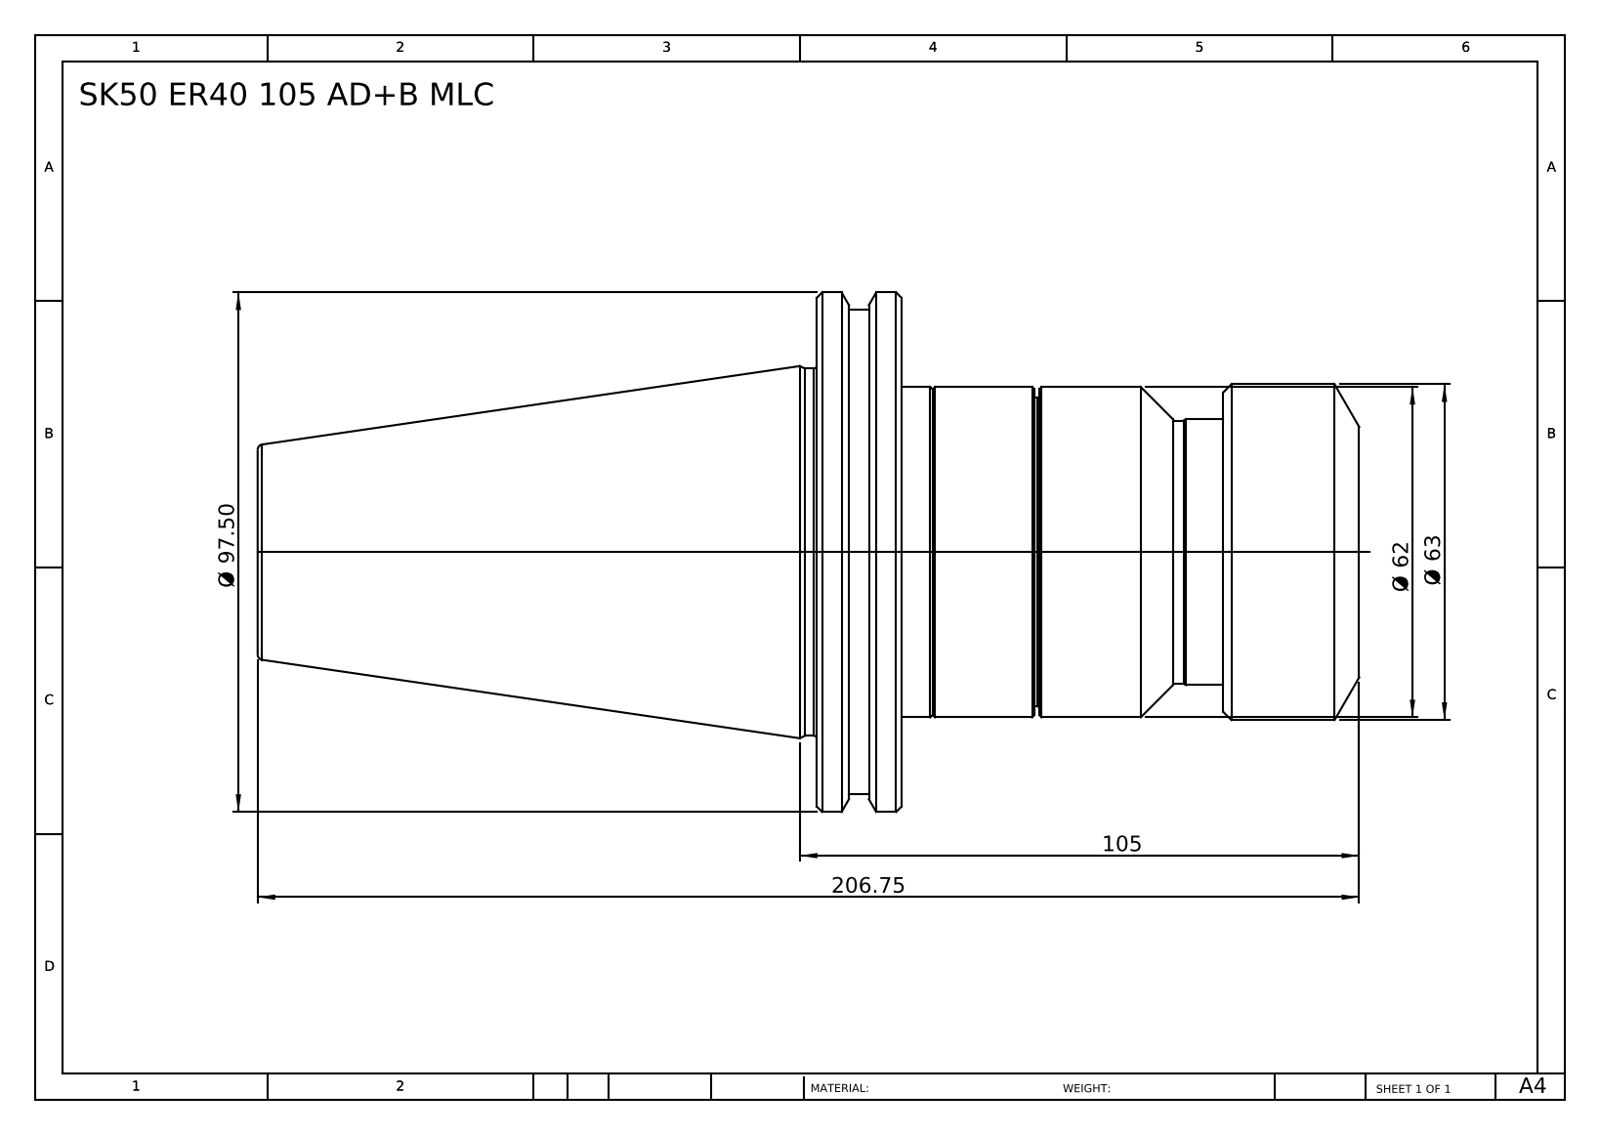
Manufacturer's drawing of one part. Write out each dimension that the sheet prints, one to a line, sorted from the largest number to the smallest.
206.75
105
Ø 97.50
Ø 63
Ø 62
